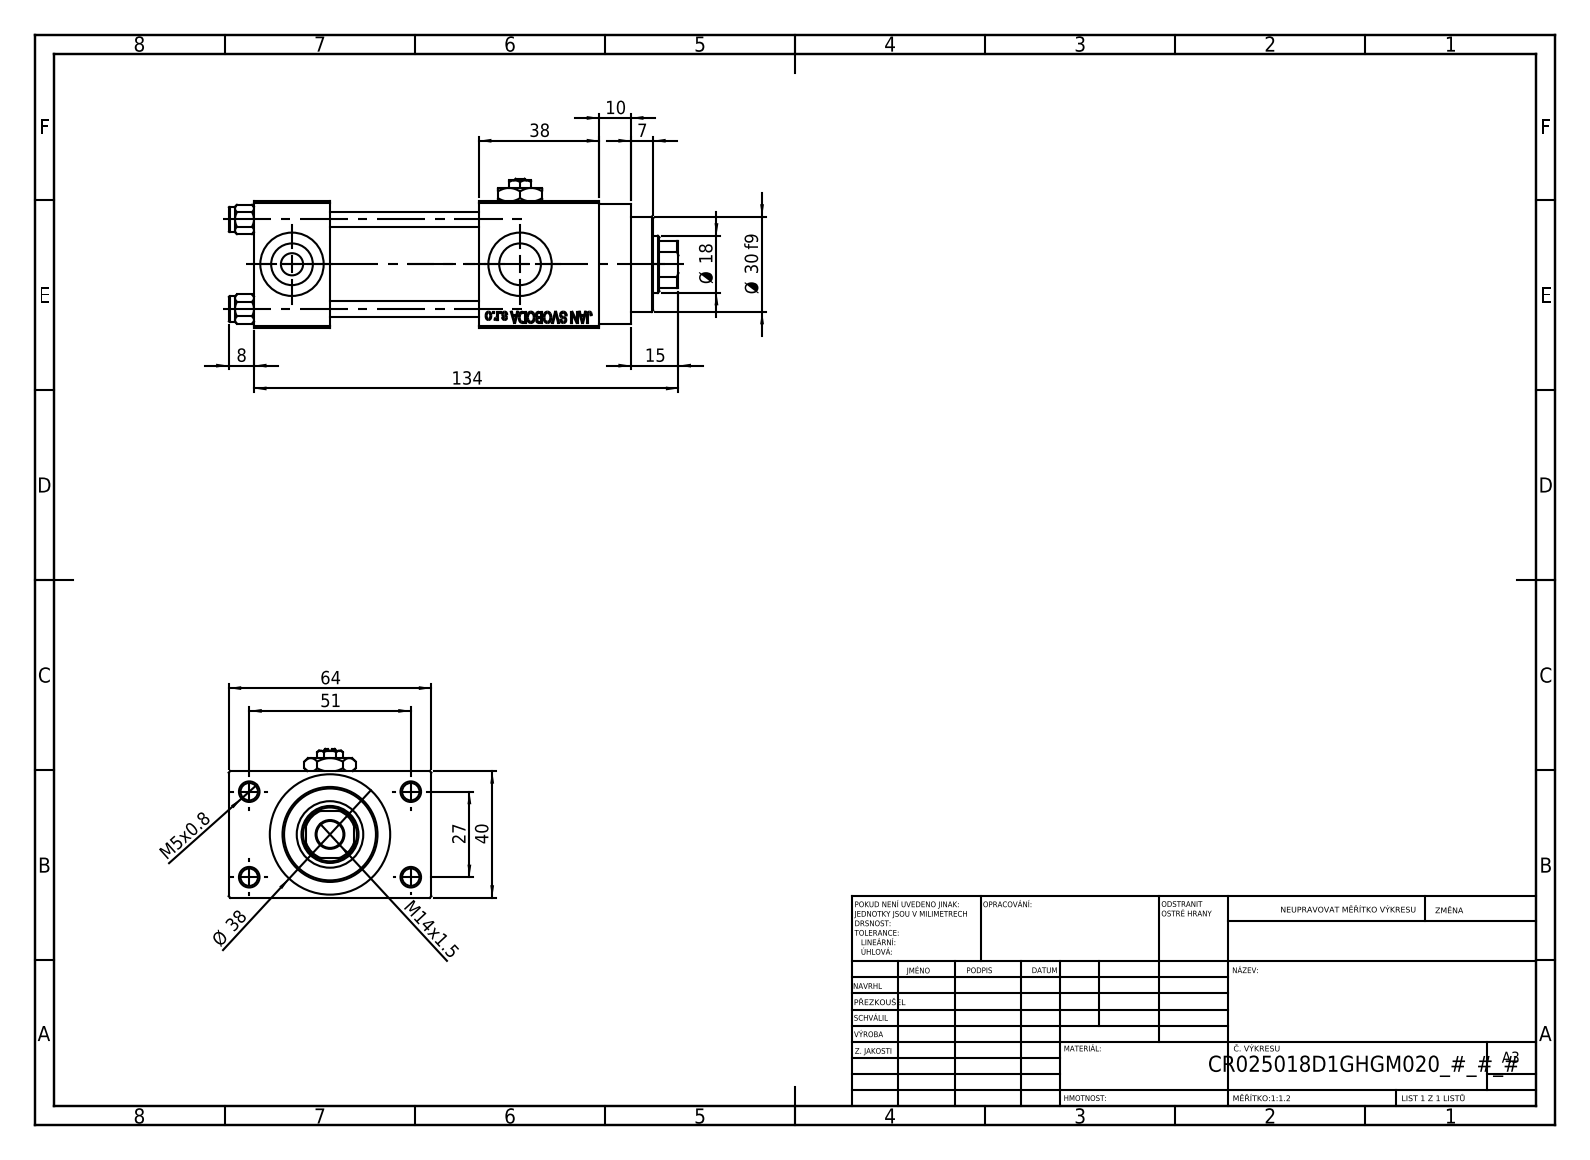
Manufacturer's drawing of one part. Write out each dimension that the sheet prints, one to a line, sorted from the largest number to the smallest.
134
64
51
40
38
Ø 38
Ø 30 f9
27
Ø 18
15
M14x1.5
10
8
7
M5x0.8
